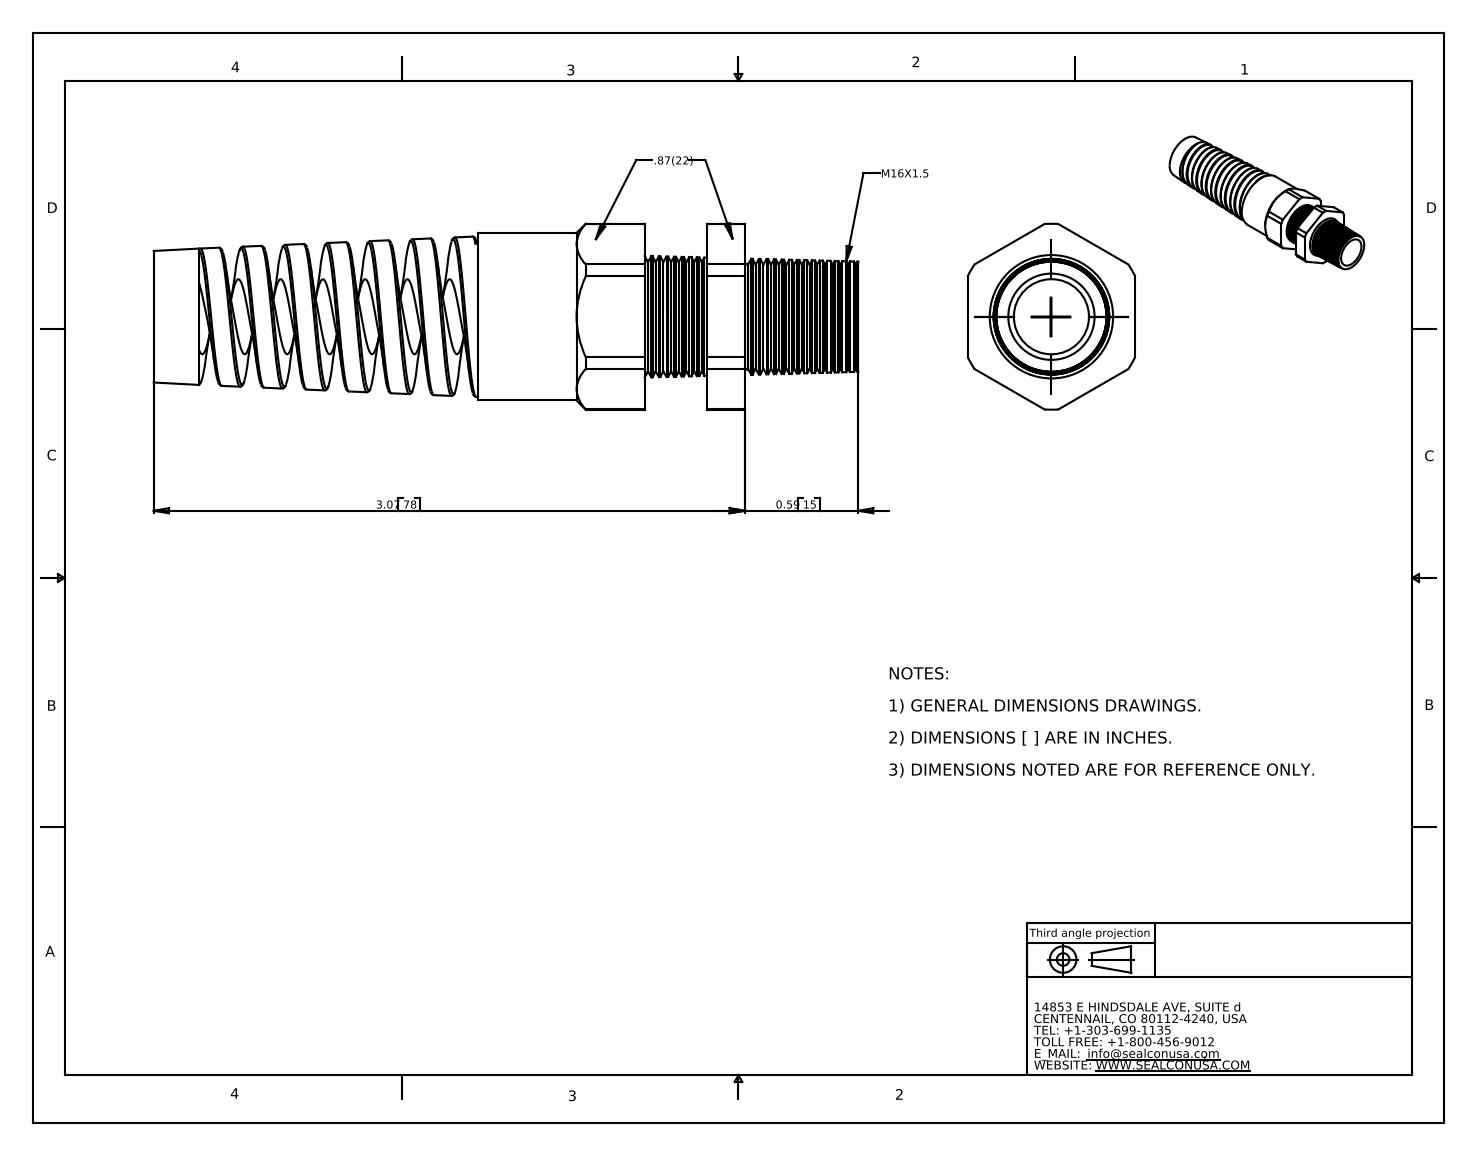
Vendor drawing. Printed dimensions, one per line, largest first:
3.07 78
0.59 15
